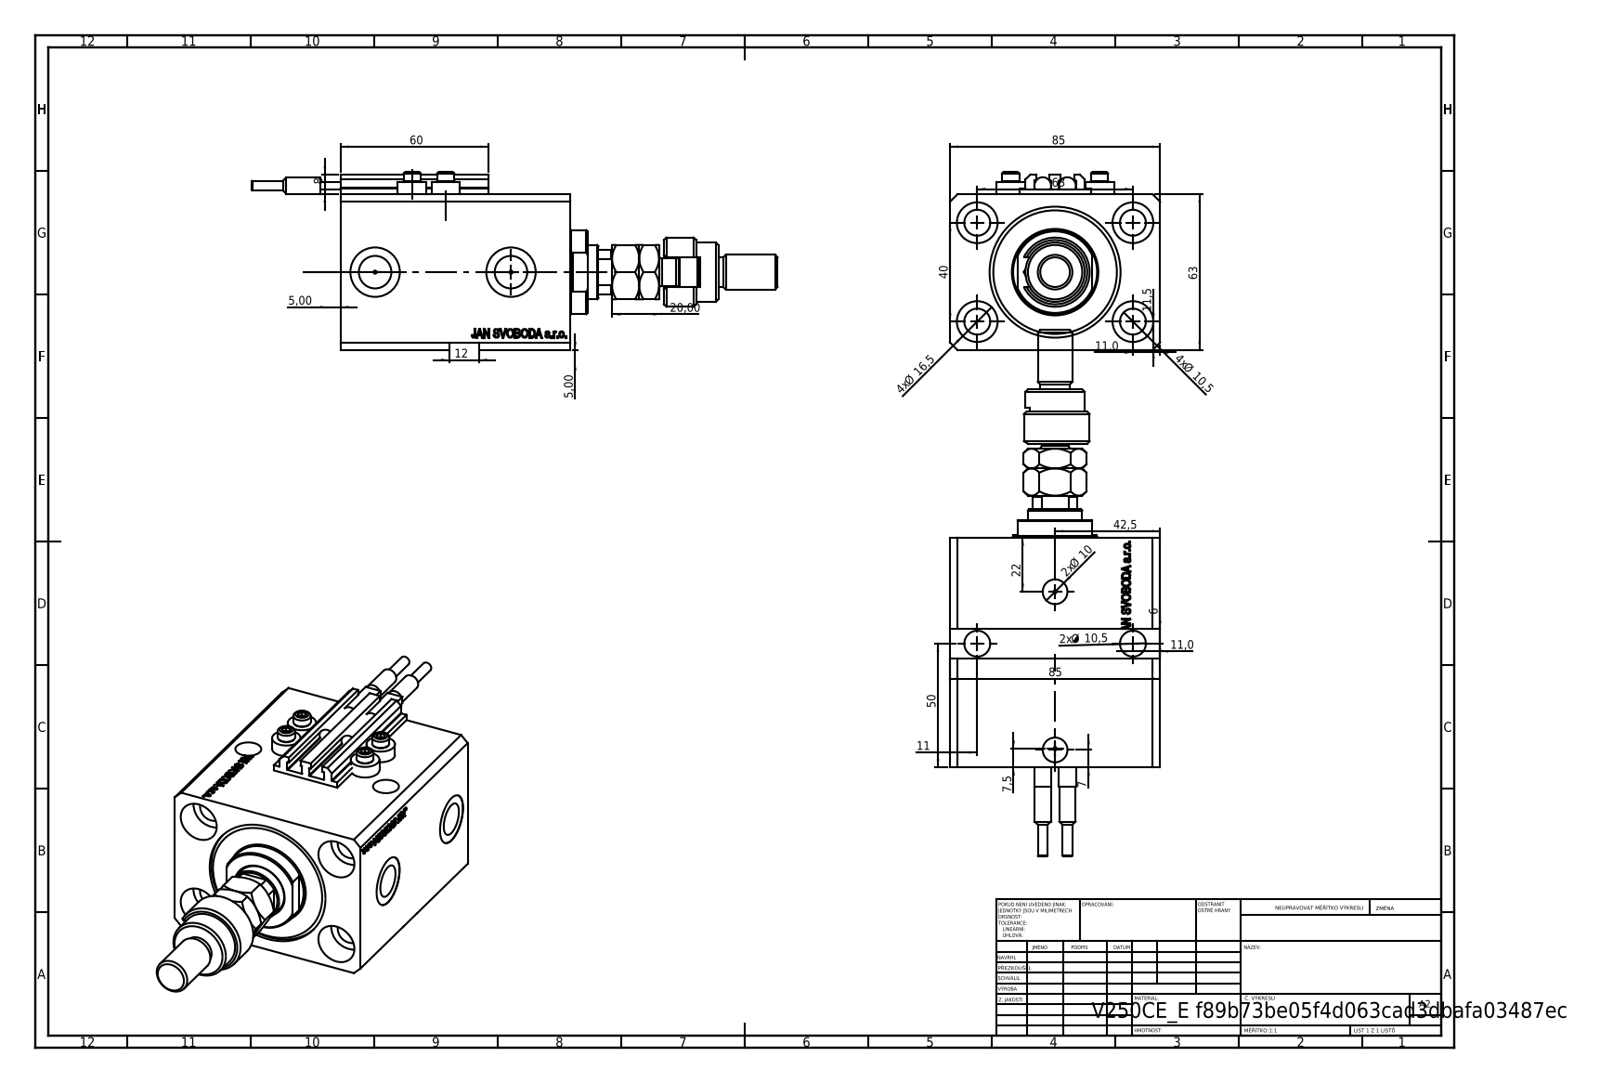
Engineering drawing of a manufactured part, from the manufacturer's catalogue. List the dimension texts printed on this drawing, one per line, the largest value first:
85
85
63
63
60
50
42,5
40
22
20,00
4x Ø 16,5
12
11,5
11,0
11,0
11
4x Ø 10,5
2x Ø 10,5
2x Ø 10
8
7,5
7
6
5,00
5,00
